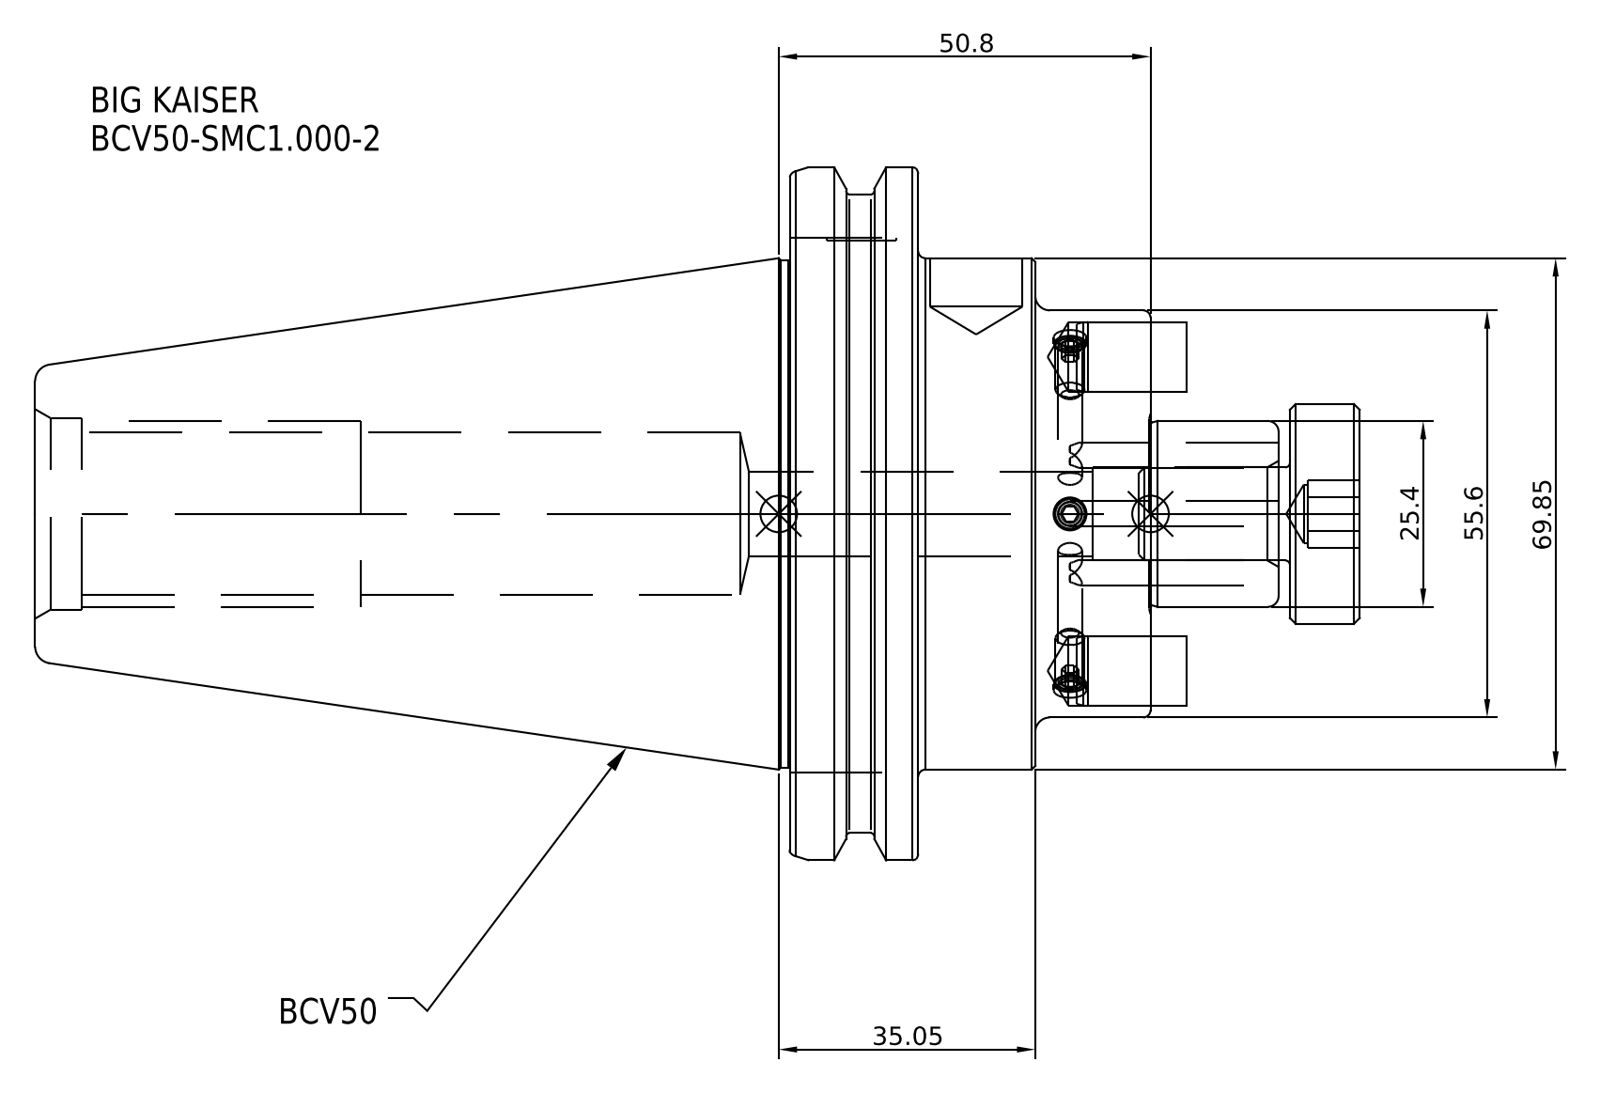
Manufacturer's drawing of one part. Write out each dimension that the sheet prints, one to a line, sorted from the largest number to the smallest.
69.85
55.6
50.8
35.05
25.4
